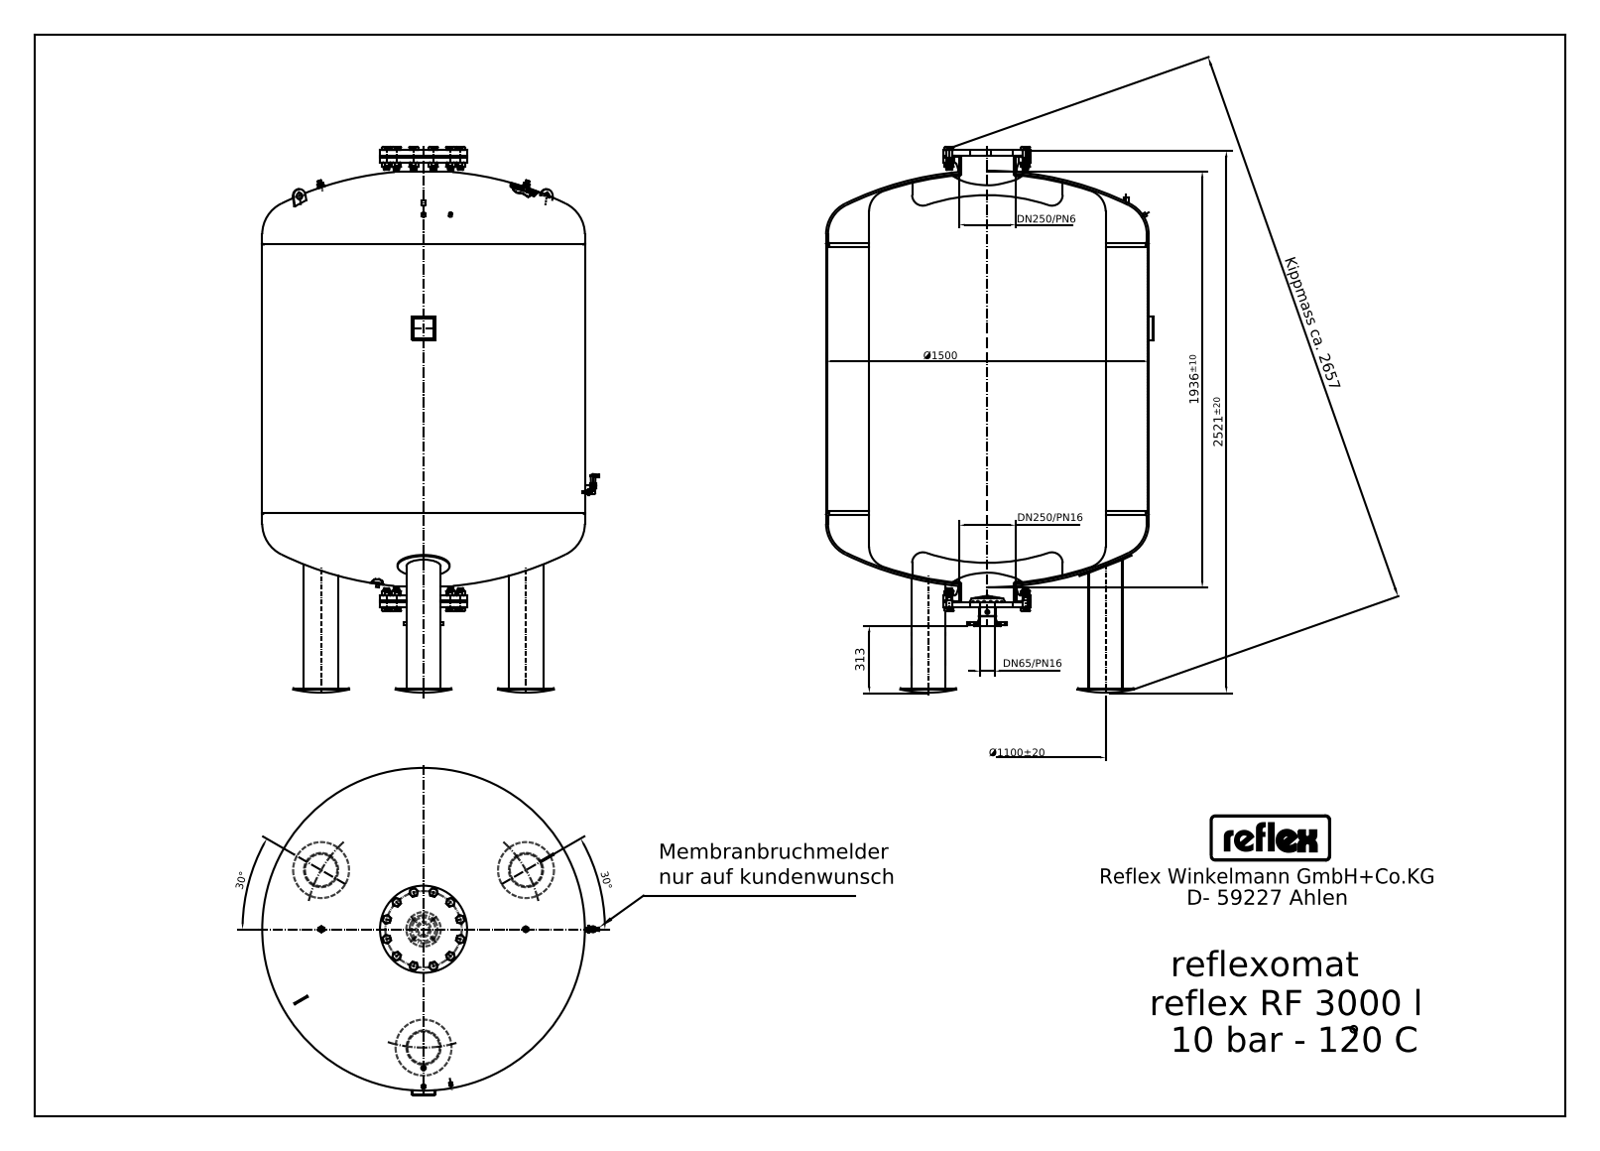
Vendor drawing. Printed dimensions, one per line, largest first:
Kippmass ca. 2657
2521±20
1936±10
Ø1500
Ø1100±20
313
DN250/PN6
DN250/PN16
DN65/PN16
30°
30°
